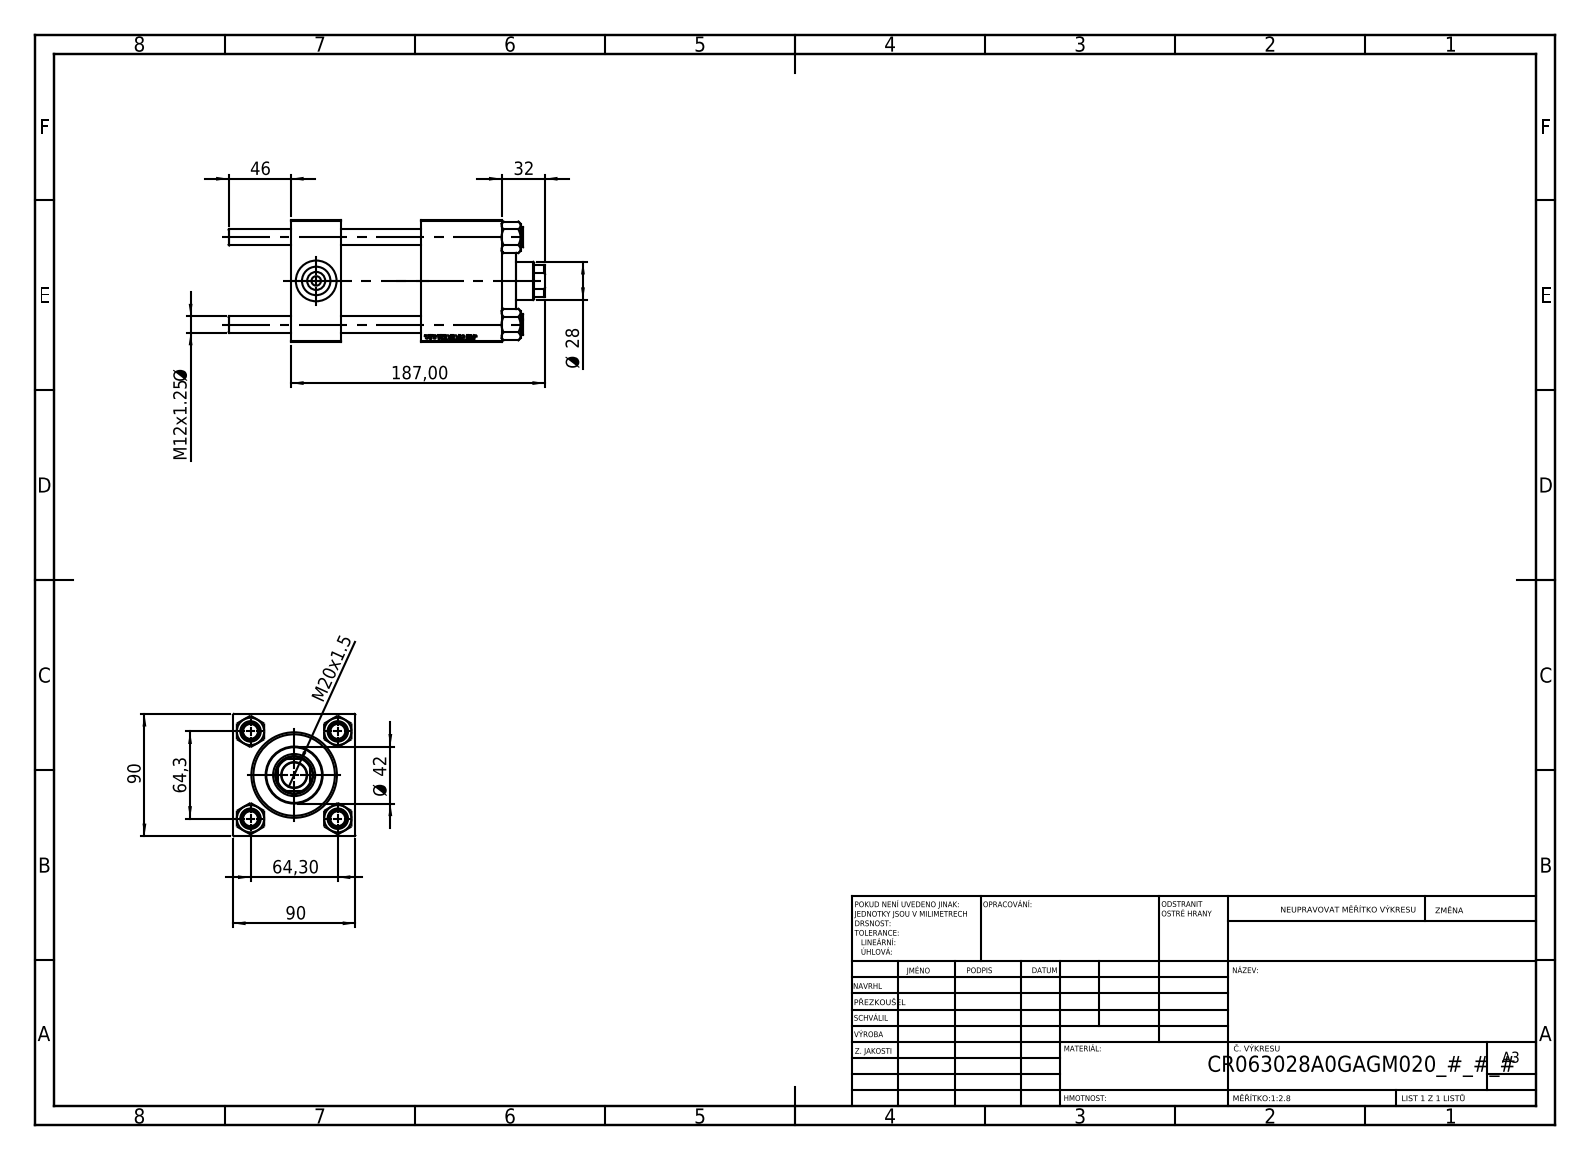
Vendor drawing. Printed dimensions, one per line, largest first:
187,00
90
90
64,3
64,30
46
Ø 42
32
Ø 28
M20x1.5
M12x1.25 Ø
